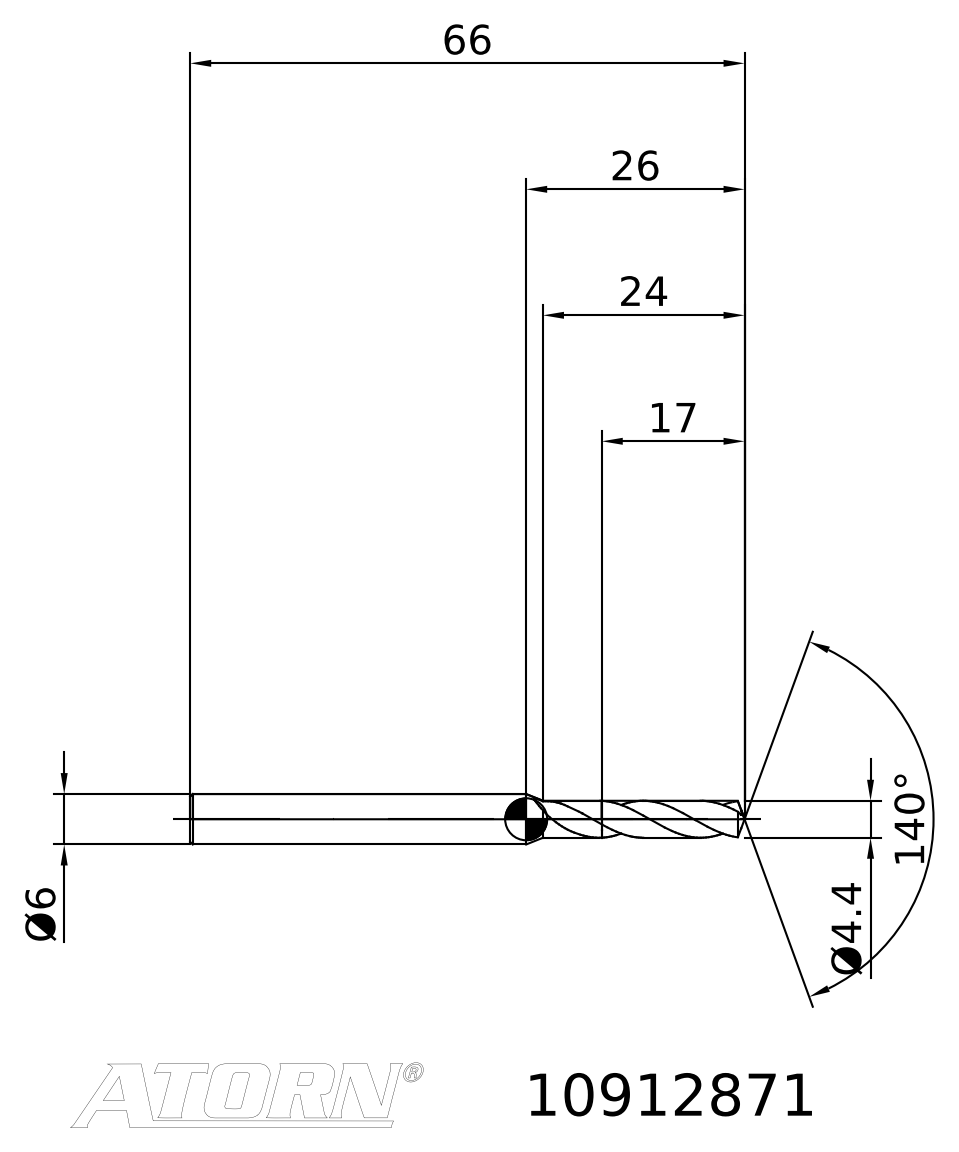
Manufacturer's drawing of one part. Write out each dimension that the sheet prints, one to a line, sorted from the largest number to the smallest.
140°
66
26
24
17
Ø6
Ø4.4
